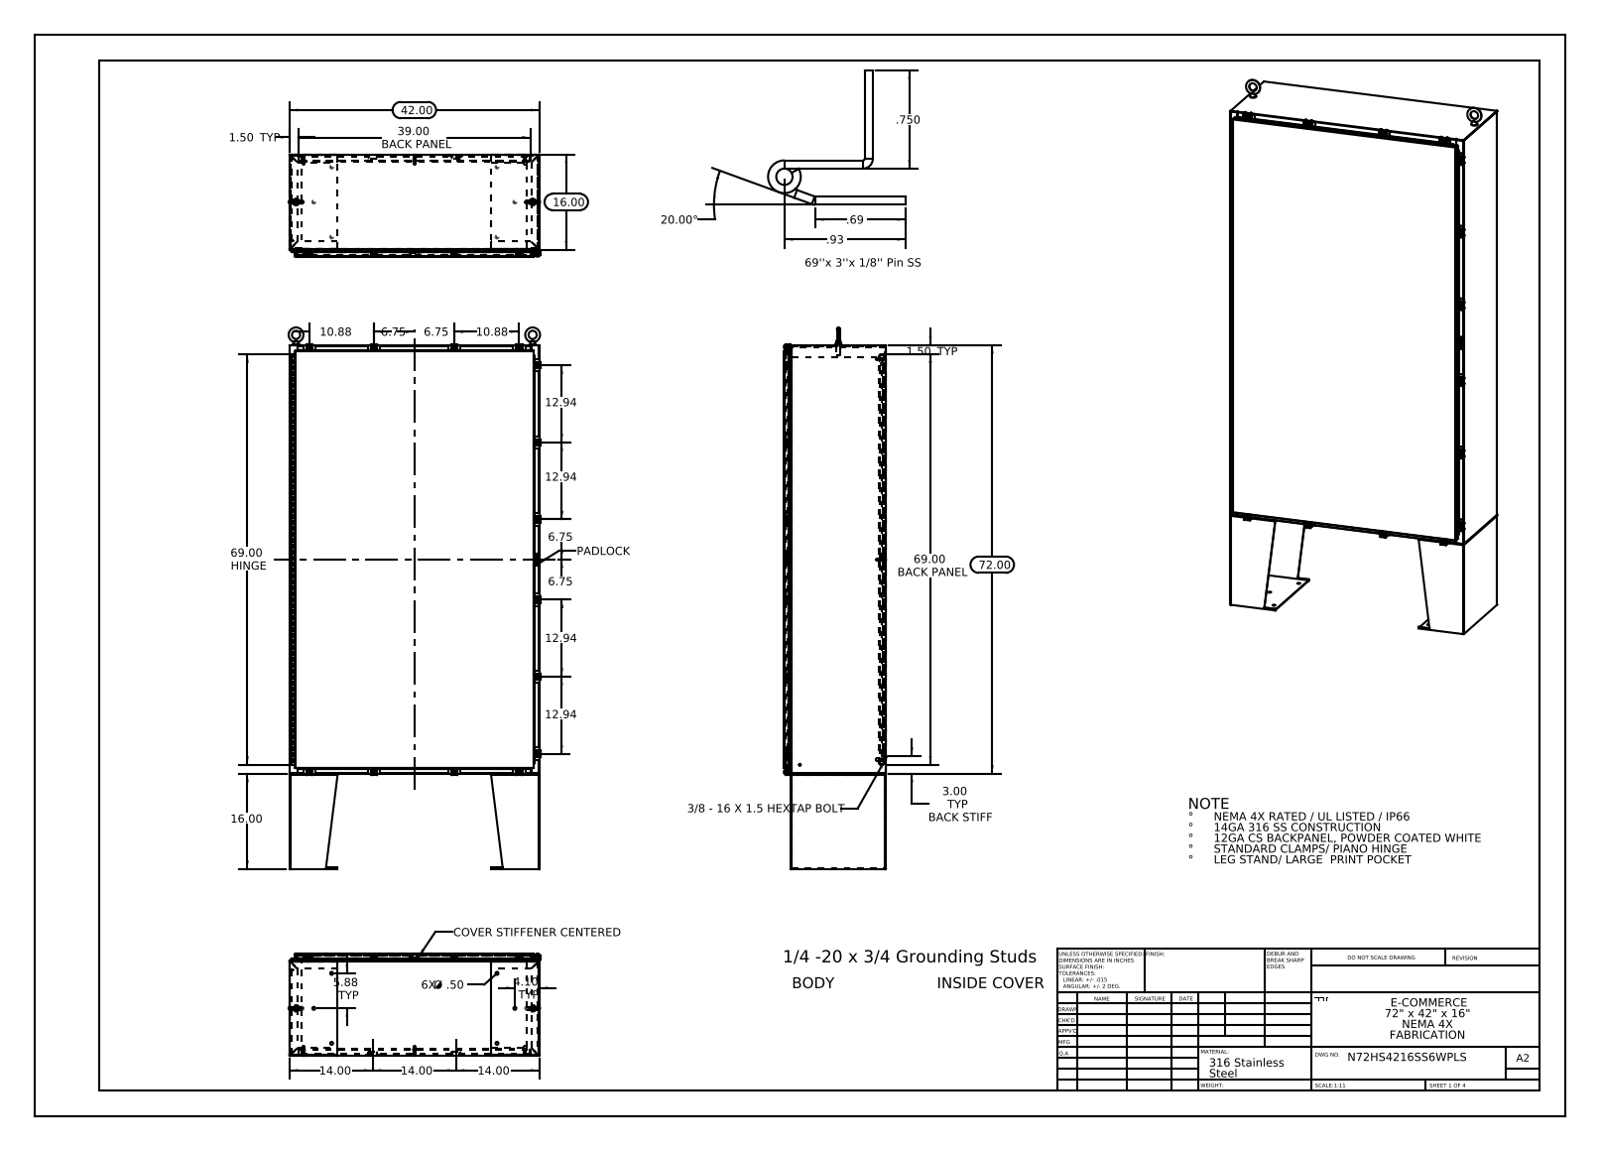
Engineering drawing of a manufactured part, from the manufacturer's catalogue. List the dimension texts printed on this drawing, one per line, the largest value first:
72.00
69.00 HINGE
69.00 BACK PANEL
42.00
39.00 BACK PANEL
20.00°
16.00
16.00
14.00
14.00
14.00
12.94
12.94
12.94
12.94
10.88
10.88
6.75
6.75
6.75
6.75
5.88 TYP
4.10 TYP
3.00 TYP BACK STIFF
1.50 TYP
1.50 TYP
.93
.750
.69
6X Ø .50
